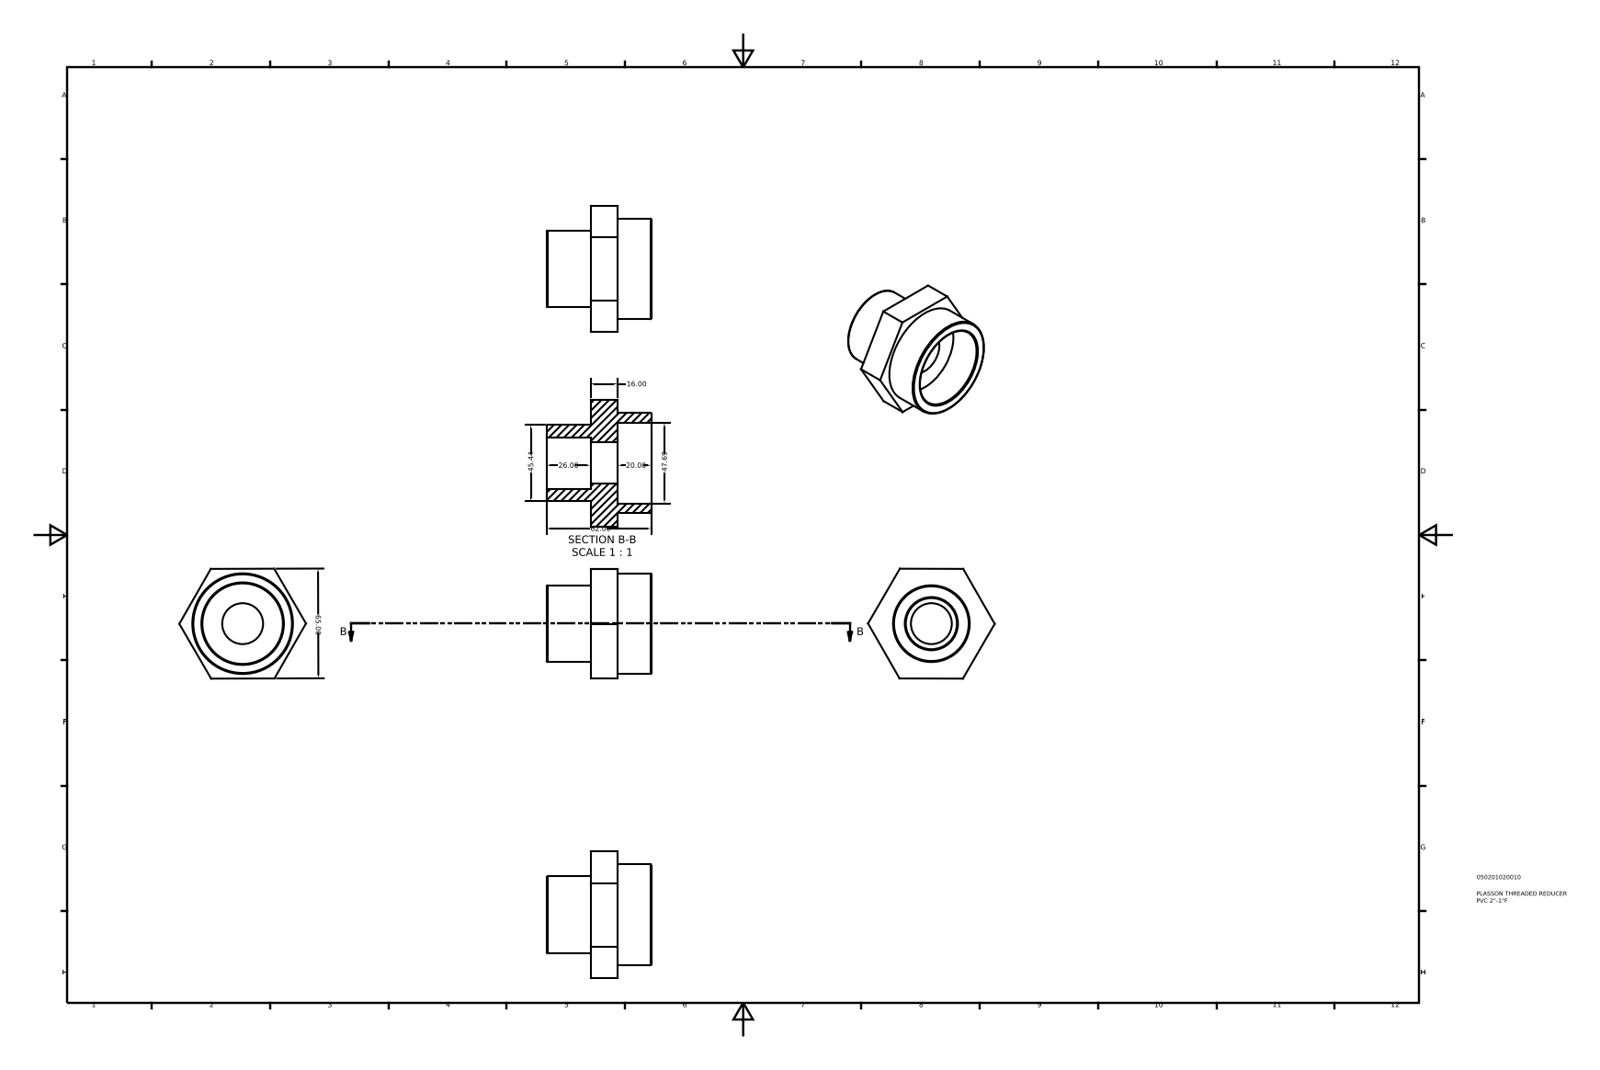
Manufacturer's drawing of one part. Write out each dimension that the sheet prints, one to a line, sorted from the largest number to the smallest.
65.00
62.00
47.69
45.44
26.00
20.00
16.00
